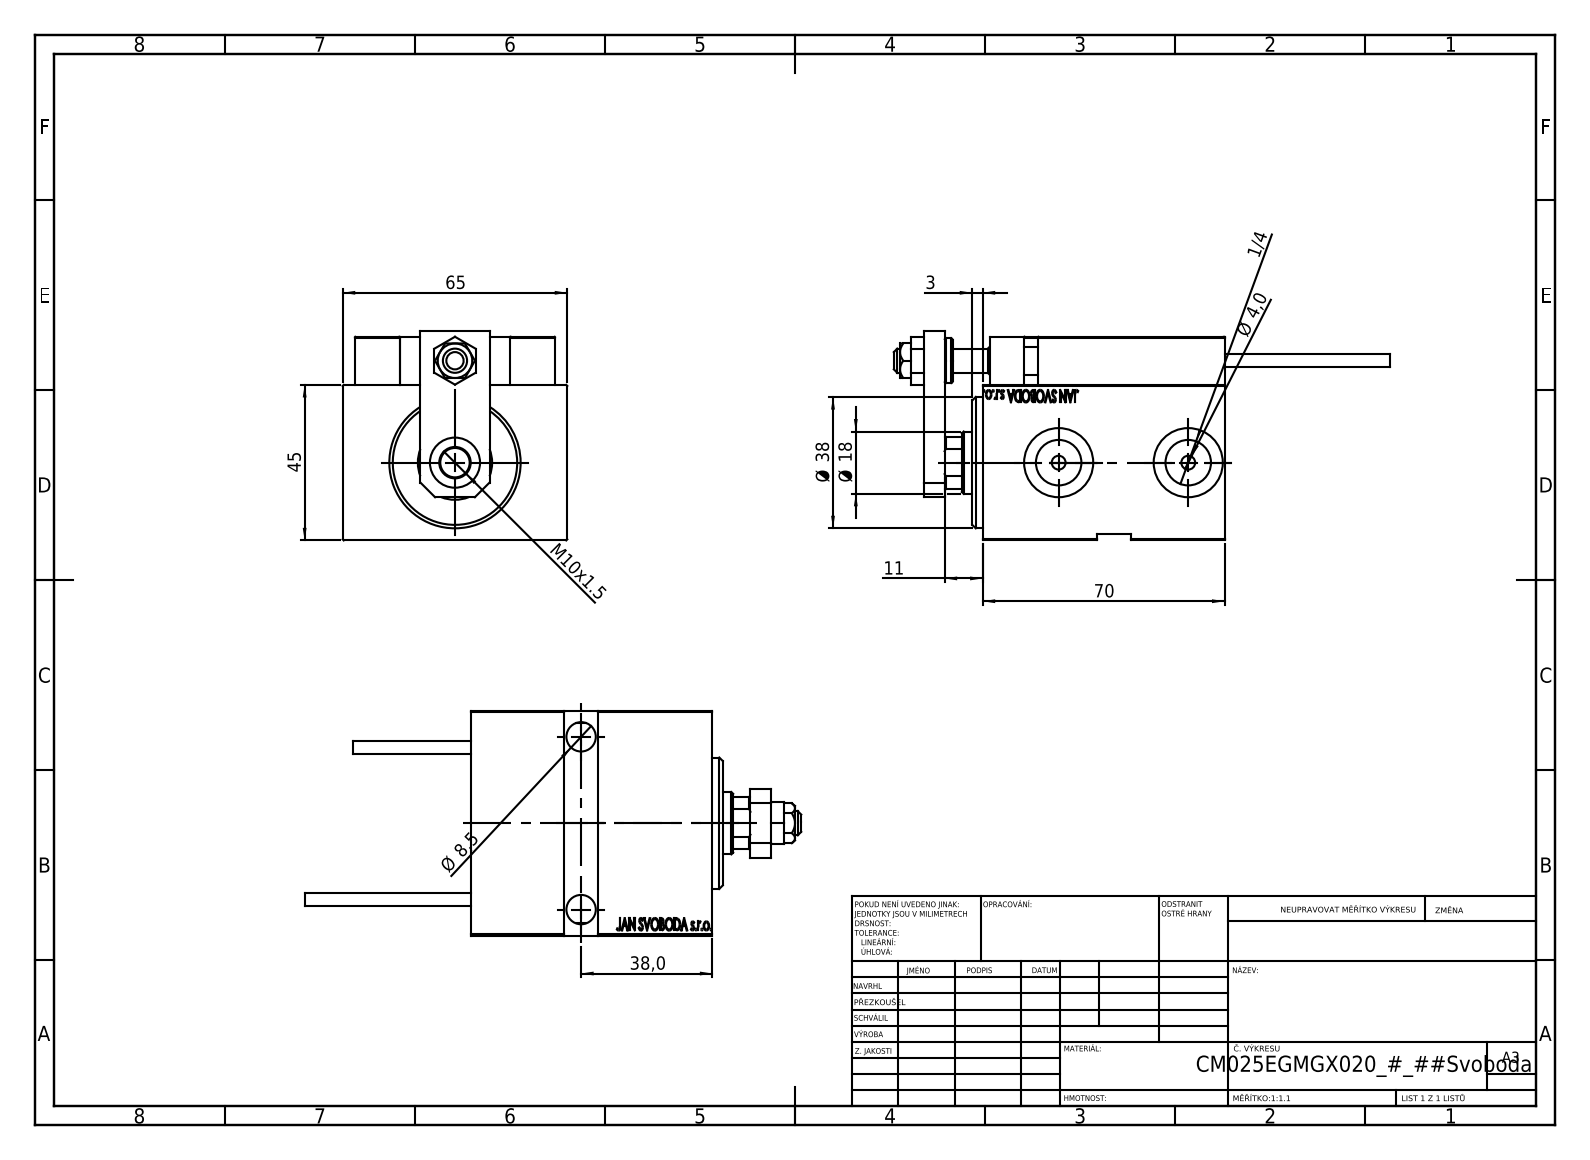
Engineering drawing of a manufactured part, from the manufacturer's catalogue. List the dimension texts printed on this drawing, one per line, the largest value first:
70
65
45
Ø 38
38,0
Ø 18
11
M10x1.5
Ø 8,5
Ø 4,0
3
1/4
